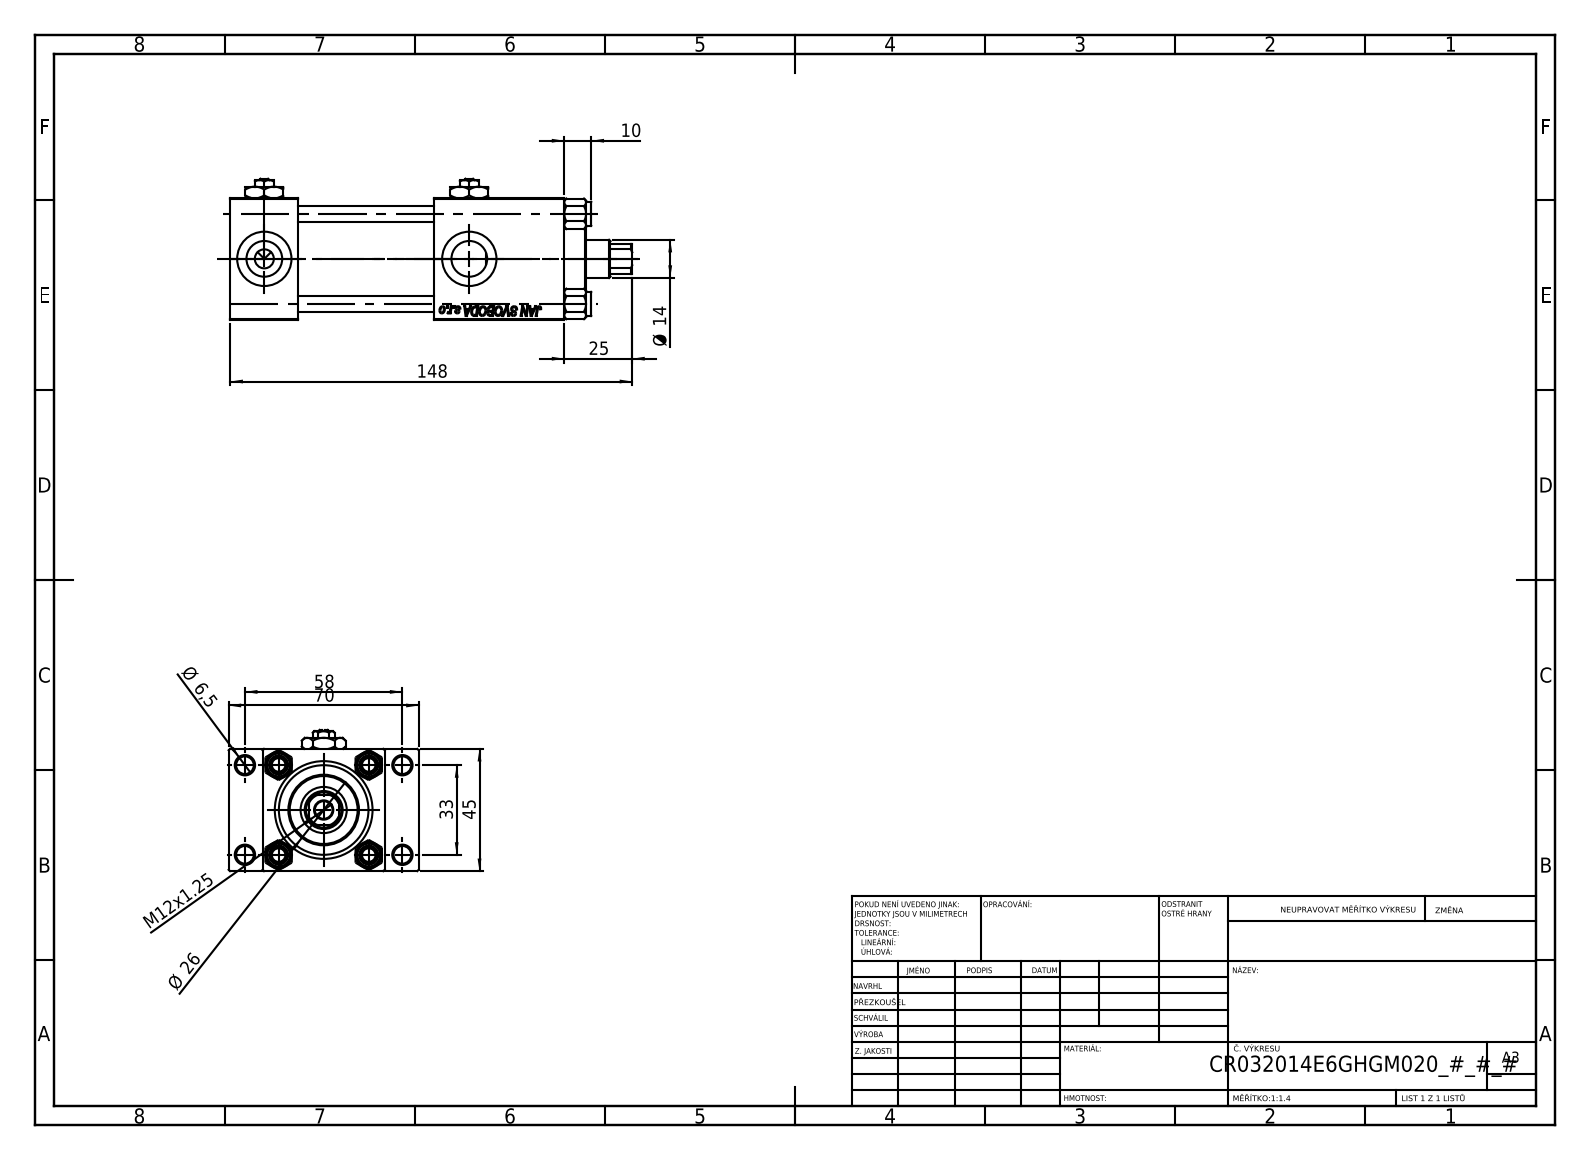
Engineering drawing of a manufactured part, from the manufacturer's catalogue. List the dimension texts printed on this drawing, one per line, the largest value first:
148
70
58
45
33
Ø 26
25
Ø 14
M12x1.25
10
Ø 6,5
